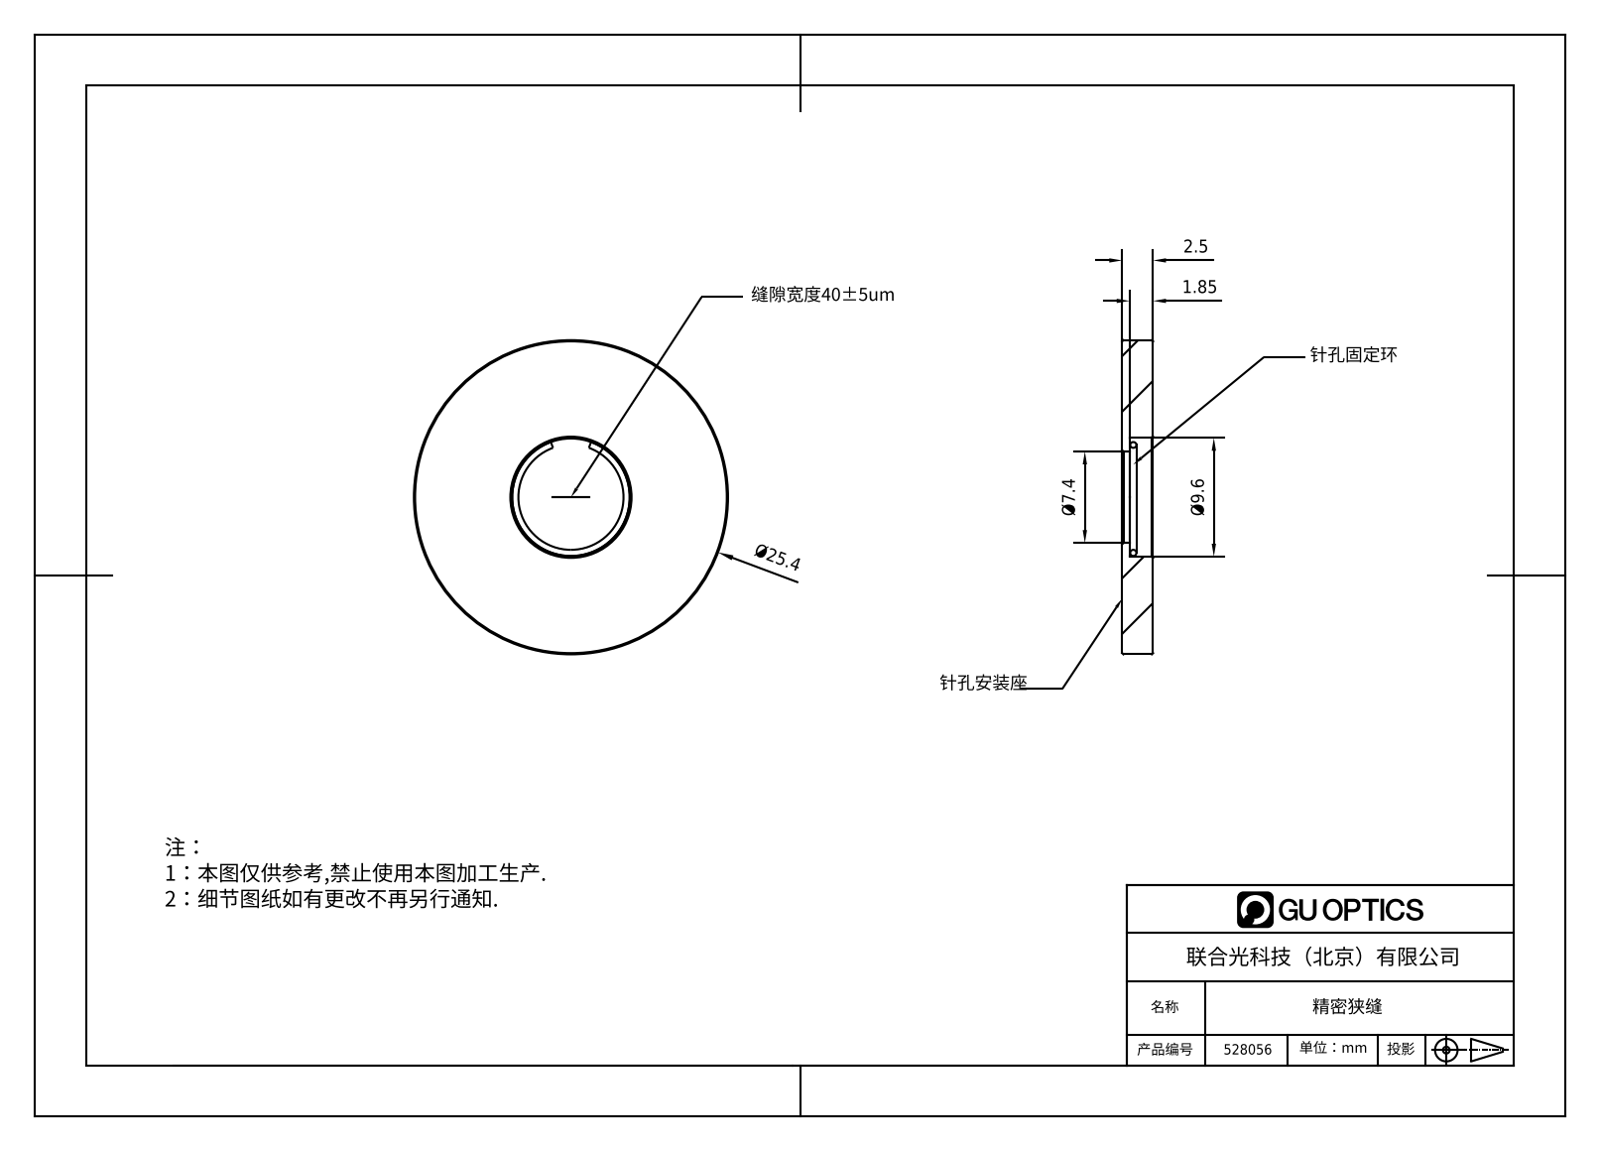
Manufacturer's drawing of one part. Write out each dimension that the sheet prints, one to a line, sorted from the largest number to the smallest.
Ø25.4
Ø9.6
Ø7.4
2.5
1.85
